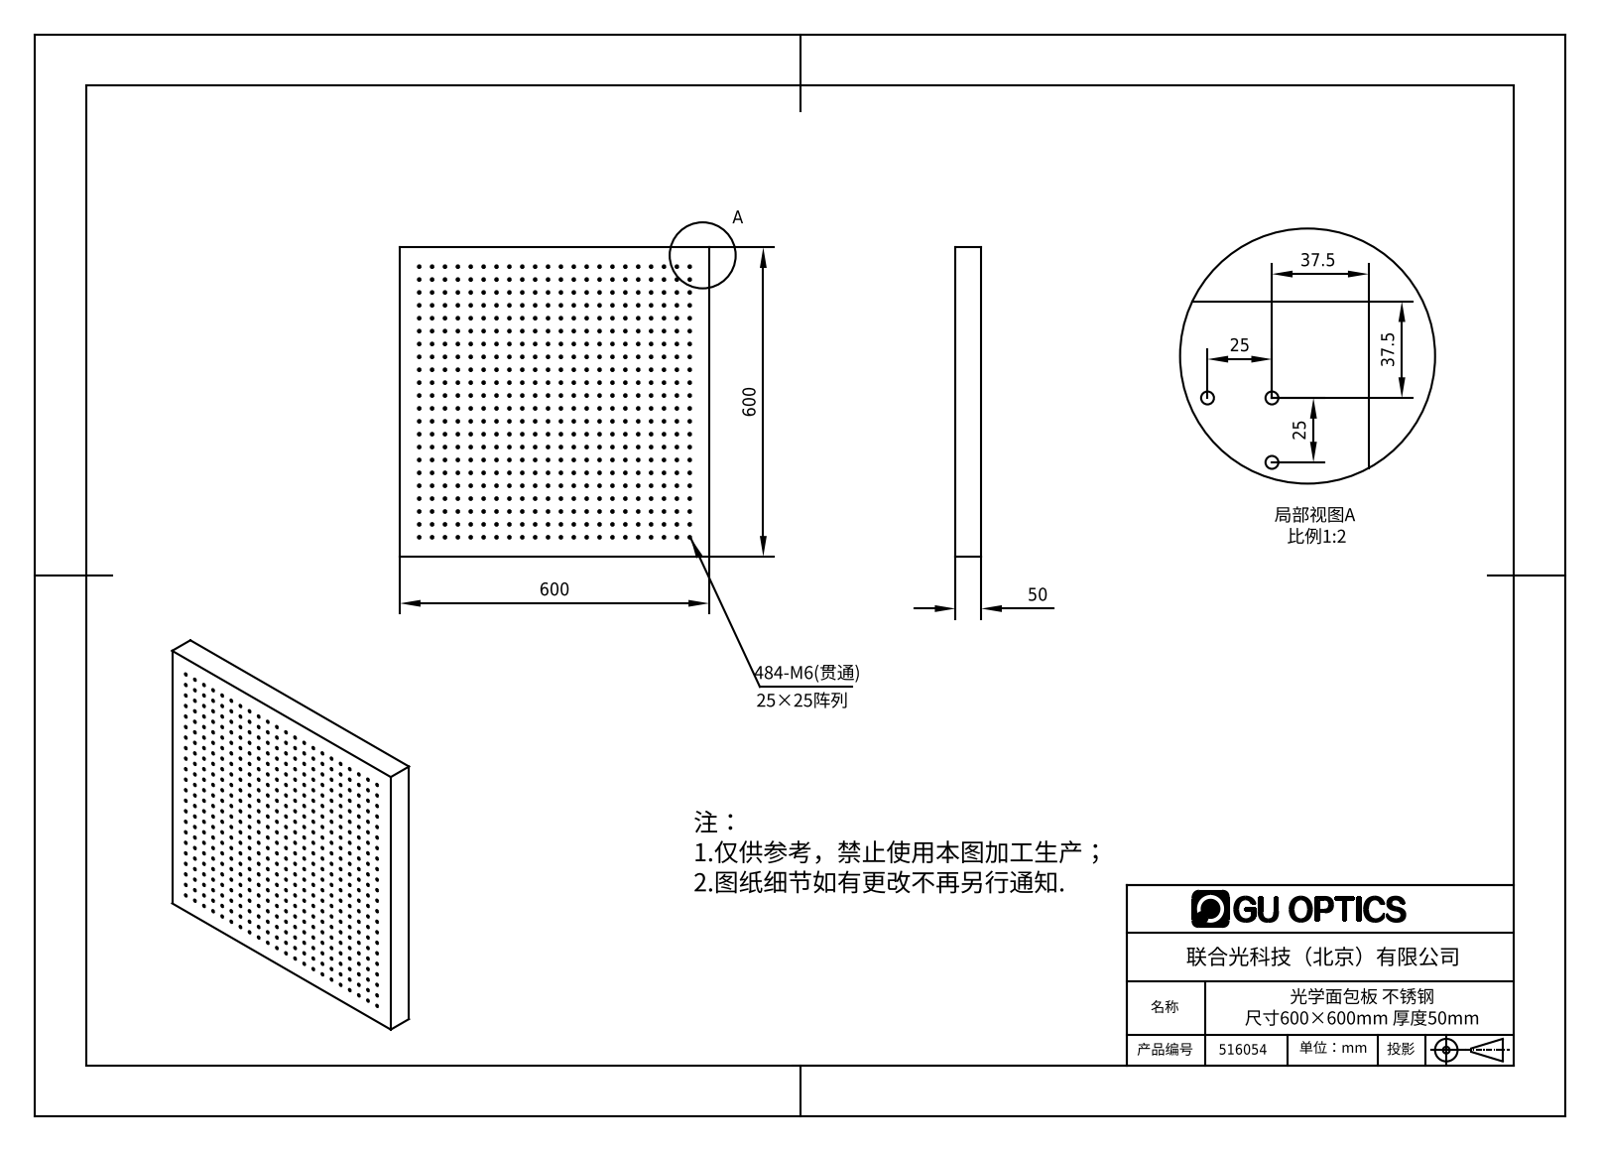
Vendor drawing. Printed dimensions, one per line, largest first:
600
600
50
37.5
37.5
25
25
